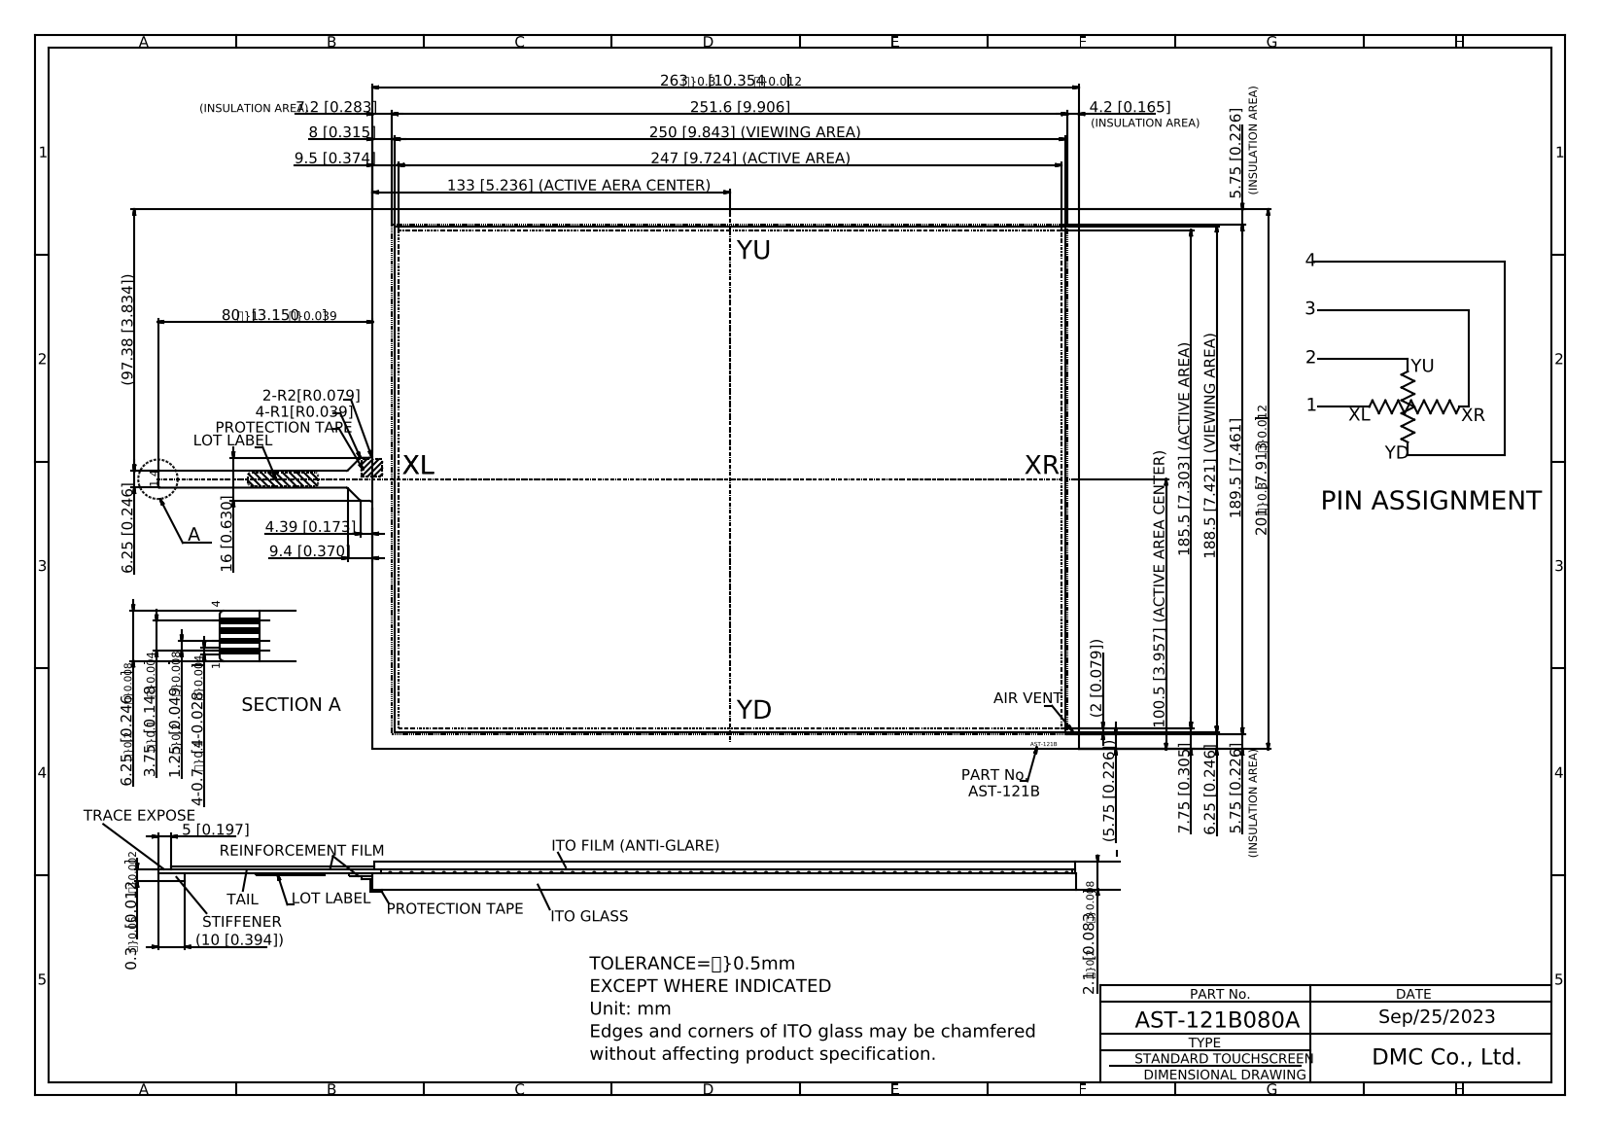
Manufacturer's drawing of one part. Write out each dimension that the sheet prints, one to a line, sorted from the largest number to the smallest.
263.00
251.6 [9.906]
250 [9.843] (VIEWING AREA)
247 [9.724] (ACTIVE AREA)
201.00
189.5 [7.461]
188.5 [7.421] (VIEWING AREA)
185.5 [7.303] (ACTIVE AREA)
133 [5.236] (ACTIVE AERA CENTER)
100.5 [3.957] (ACTIVE AREA CENTER)
(97.38 [3.834])
80.00
16 [0.630]
(10 [0.394])
9.5 [0.374]
9.4 [0.370]
8 [0.315]
7.75 [0.305]
7.2 [0.283]
6.25{\H0.6875x;?}0.2}[0.246{\H0.6875x;?}0.008}]
6.25 [0.246]
6.25 [0.246]
5.75 [0.226]
5.75 [0.226]
(5.75 [0.226])
5 [0.197]
4.39 [0.173]
4.2 [0.165]
4-0.7{\H0.75x;?}0.1}[4-0.028{\H0.75x;?}0.004}]
3.75{\H0.75x;?}0.1}[0.148{\H0.75x;?}0.004}]
(2 [0.079])
1.25{\H0.75x;?}0.2}[0.049{\H0.75x;?}0.008}]
